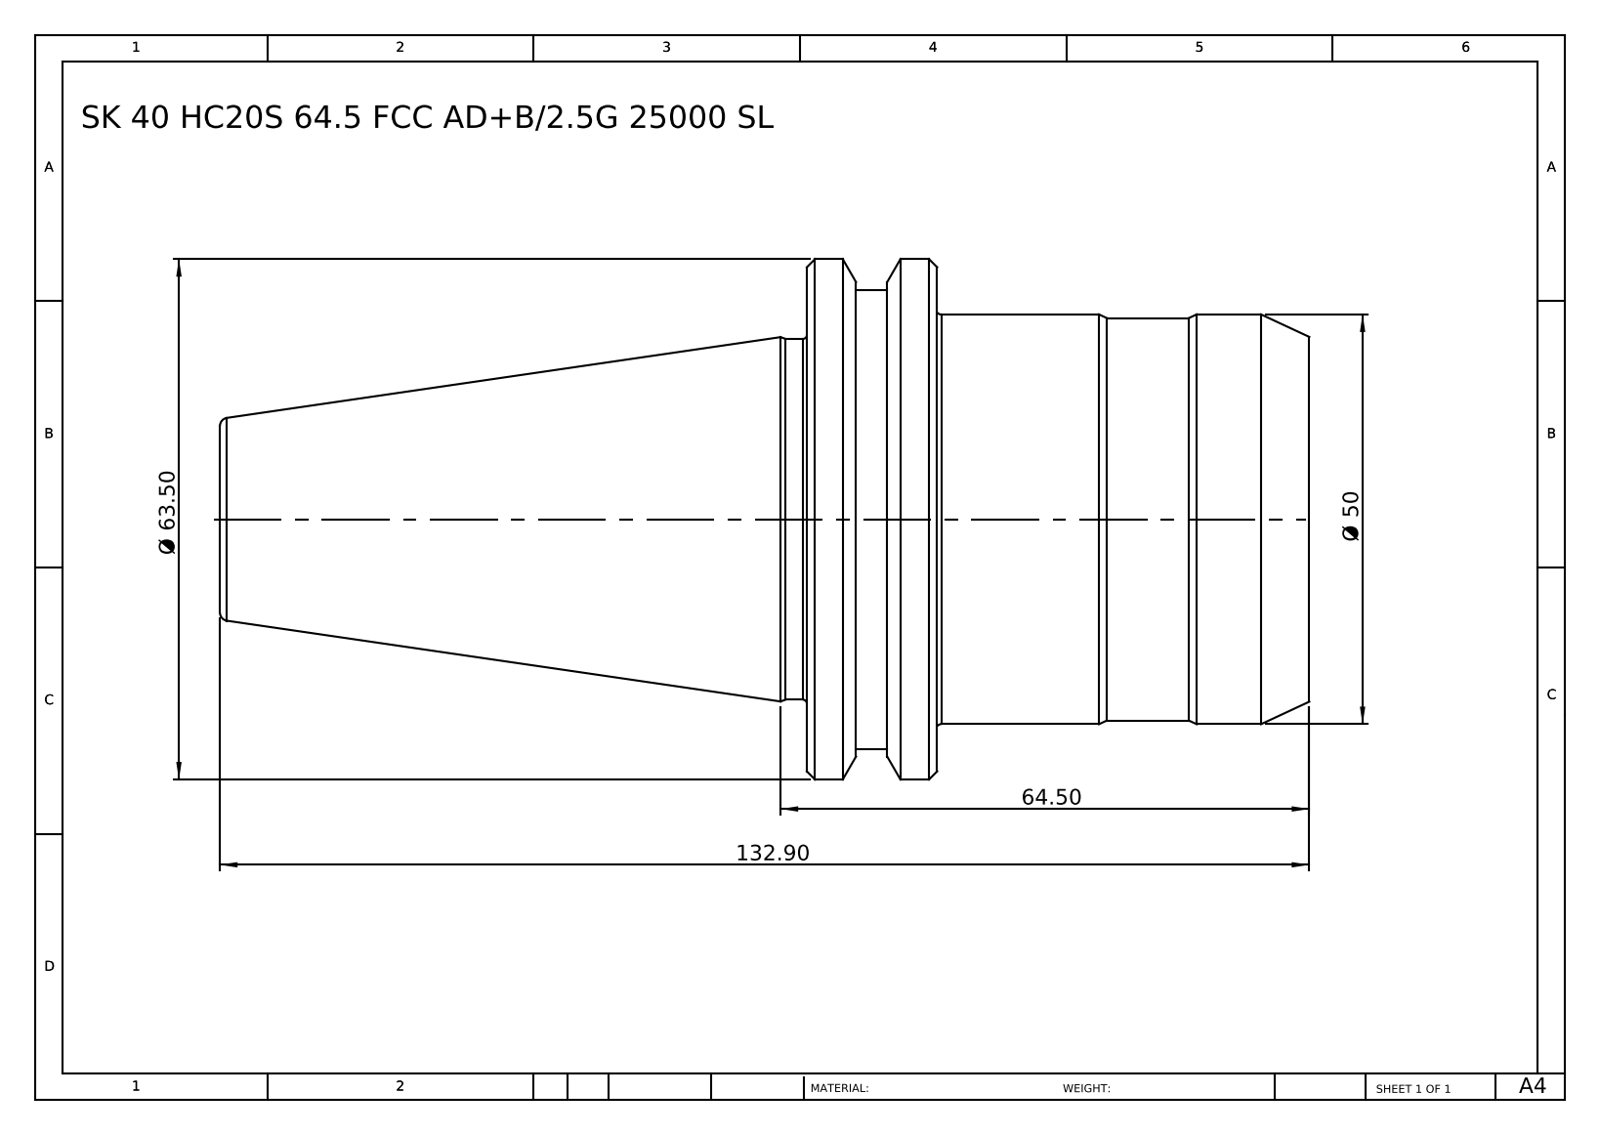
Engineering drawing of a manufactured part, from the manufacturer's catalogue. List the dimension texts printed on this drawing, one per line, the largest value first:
132.90
64.50
Ø 63.50
Ø 50
